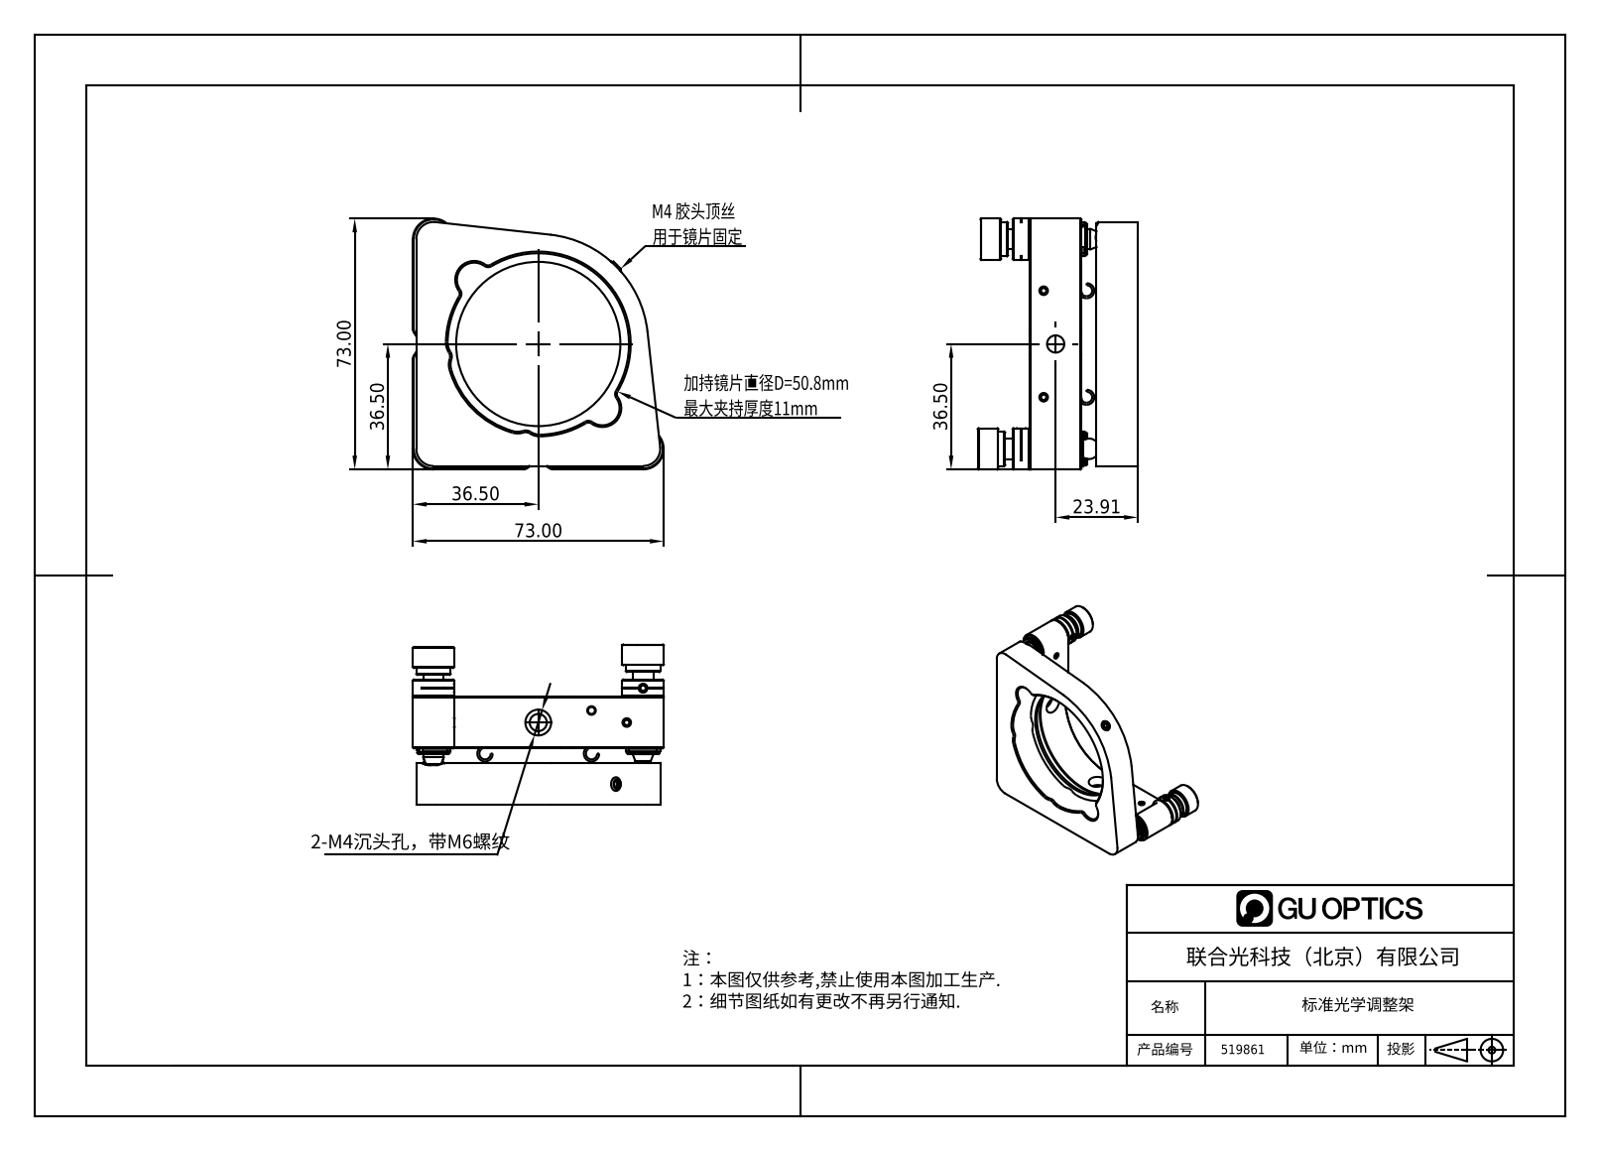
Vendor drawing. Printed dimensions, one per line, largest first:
73.00
73.00
36.50
36.50
36.50
23.91
2-M4沉头孔，带M6螺纹
